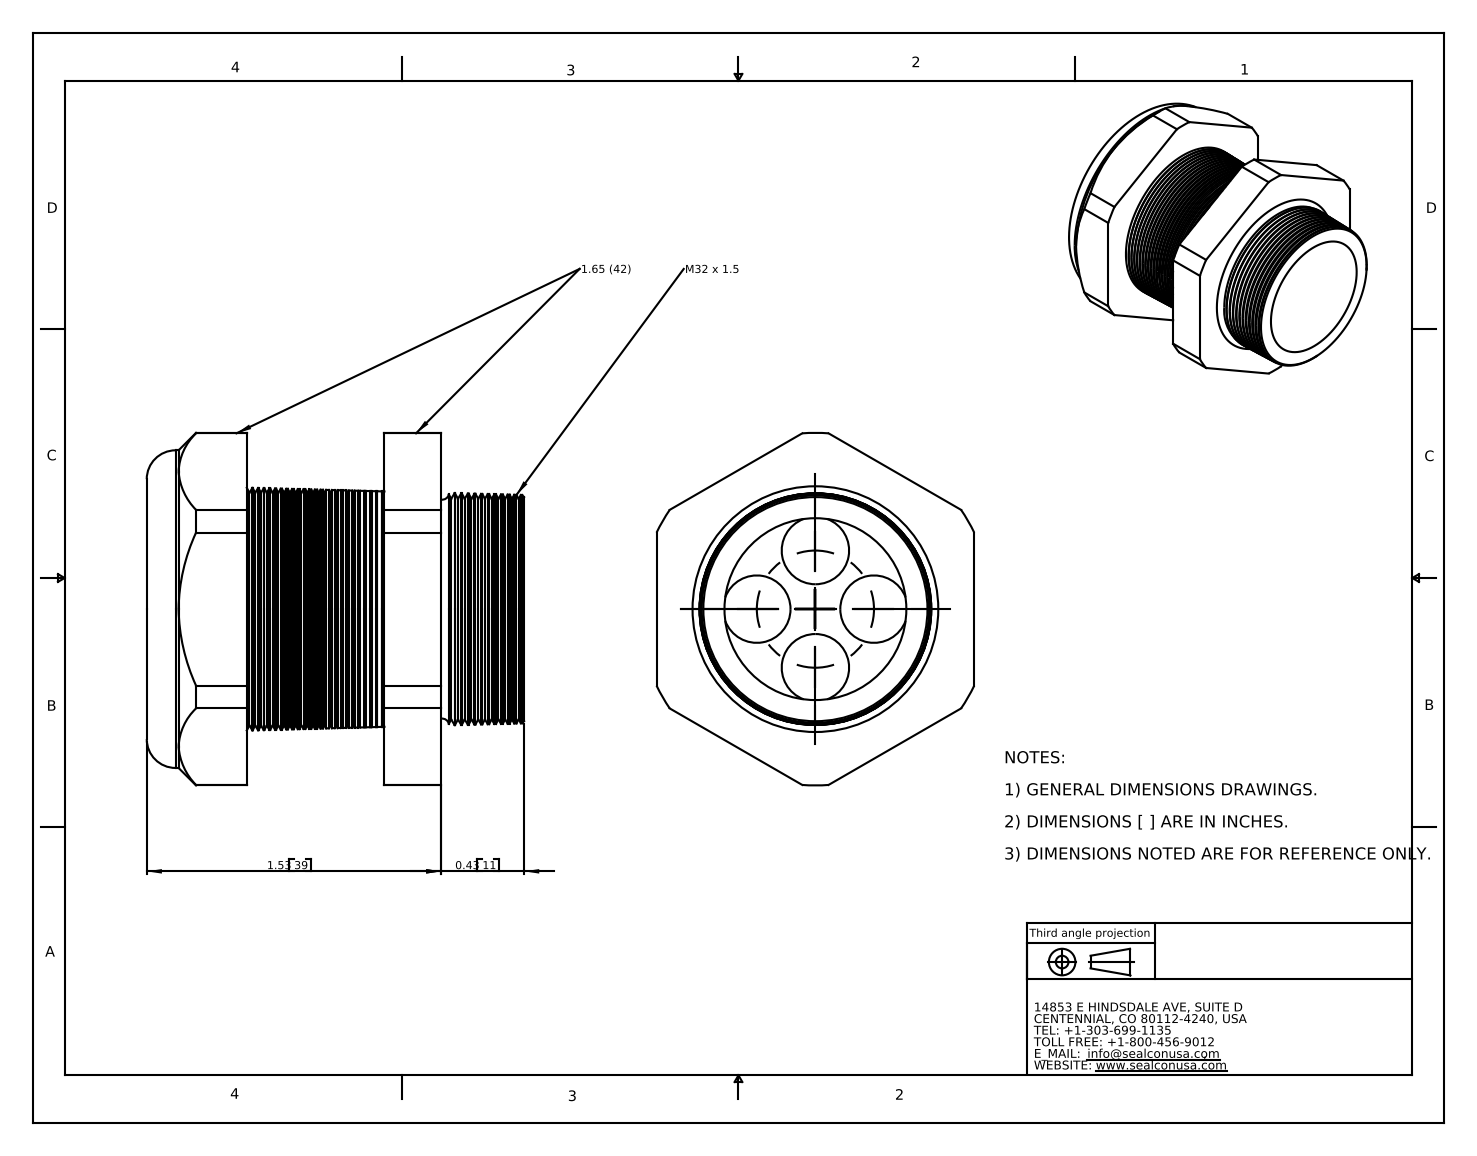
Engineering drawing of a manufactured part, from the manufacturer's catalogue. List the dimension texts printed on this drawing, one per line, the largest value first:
1.53 39
0.43 11
